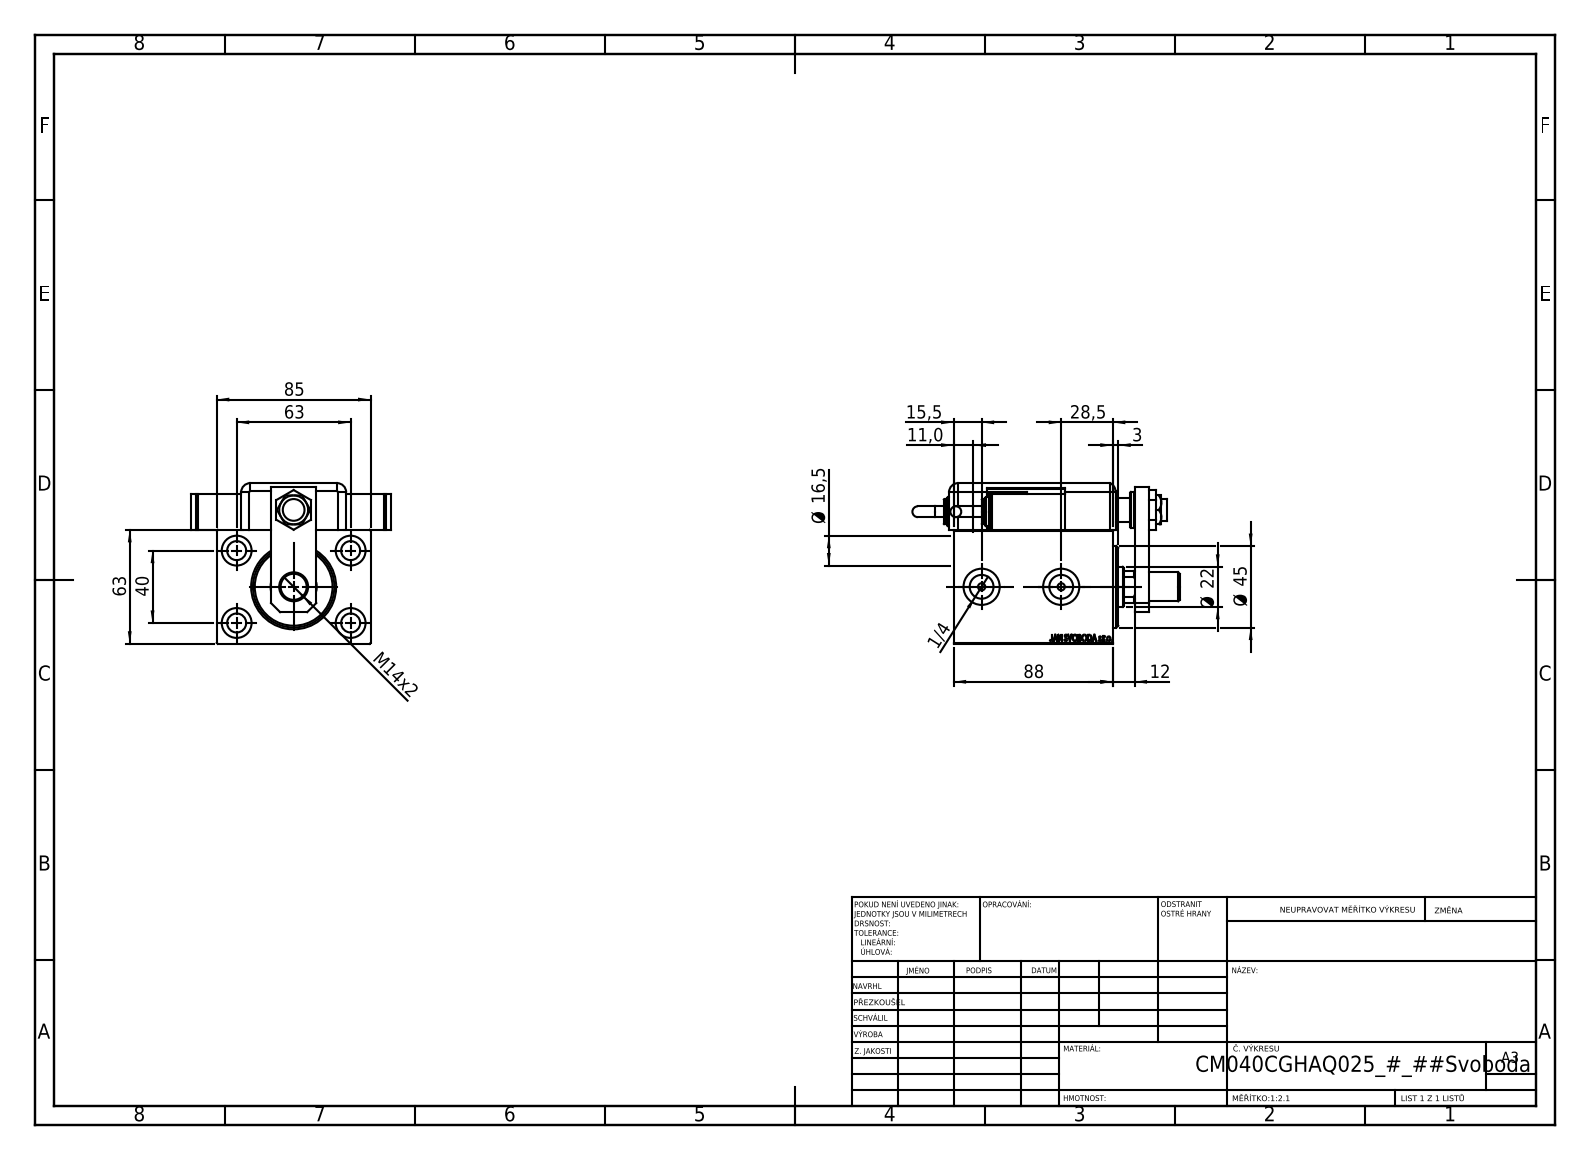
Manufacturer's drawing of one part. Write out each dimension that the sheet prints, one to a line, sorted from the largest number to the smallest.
88
85
63
63
Ø 45
40
28,5
Ø 22
Ø 16,5
15,5
M14x2
12
11,0
3
1/4
